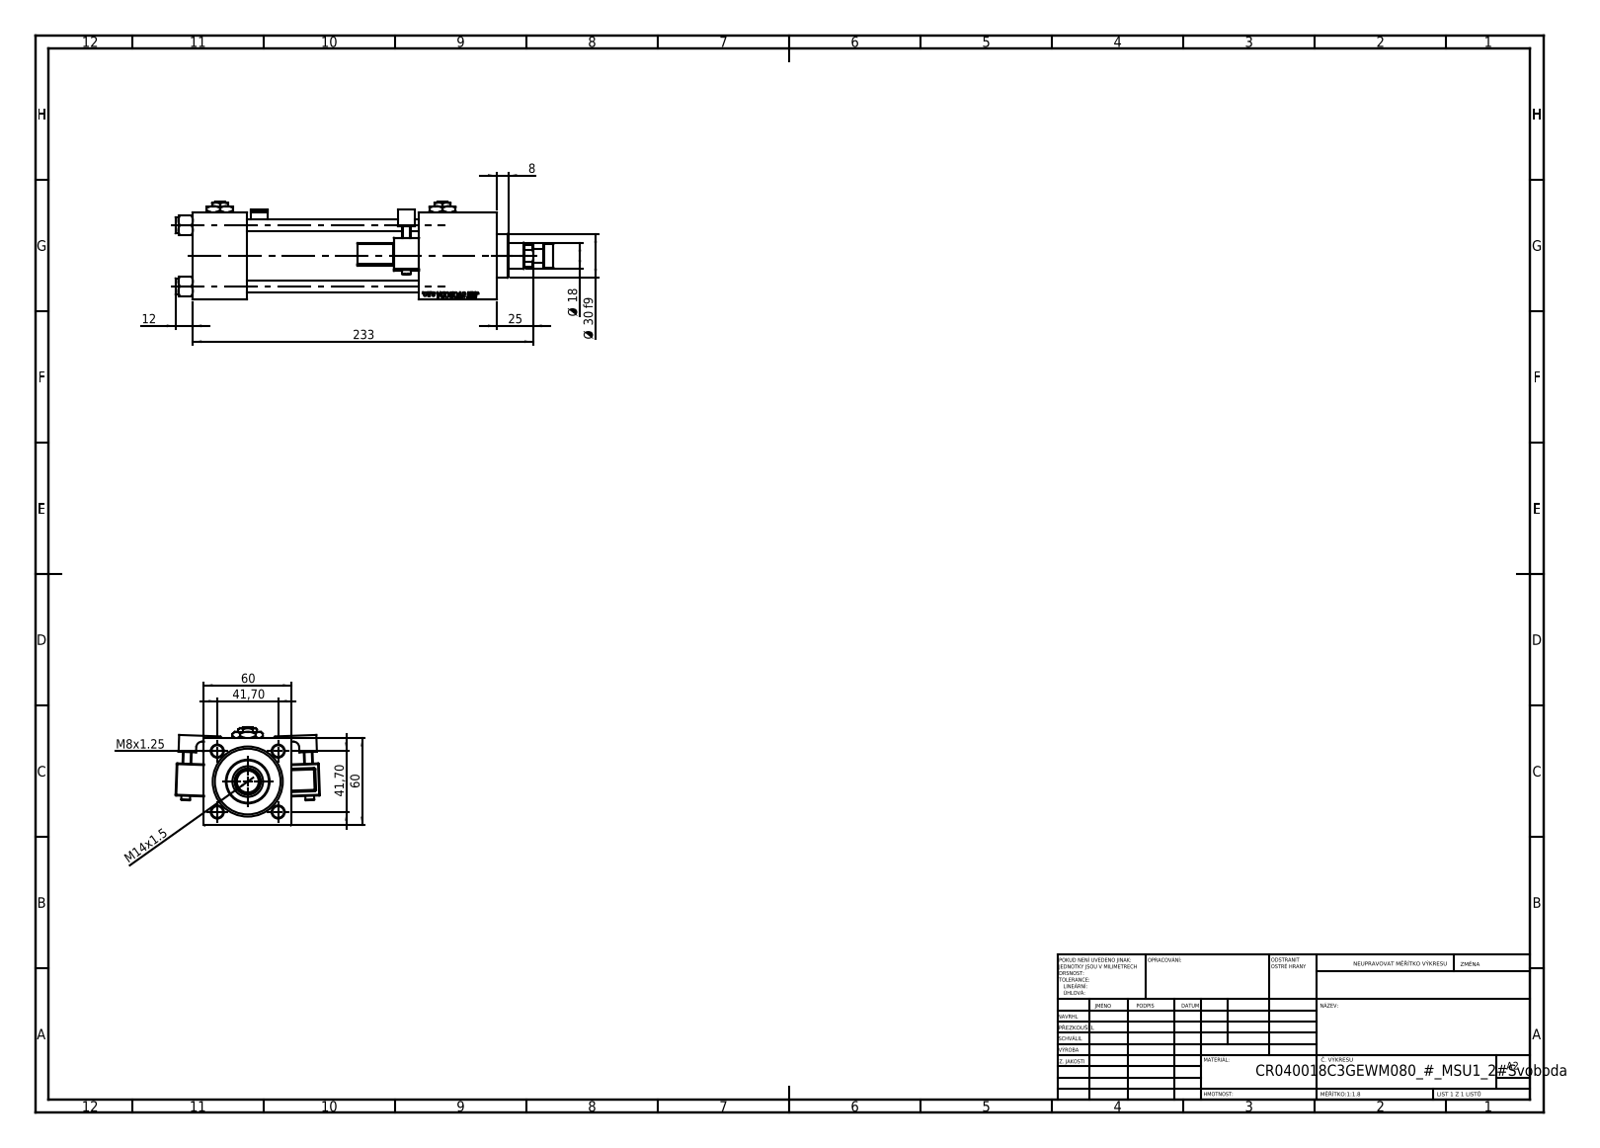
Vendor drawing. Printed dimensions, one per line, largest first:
233
60
60
41,70
41,70
Ø 30 f9
25
Ø 18
M14x1.5
12
8
M8x1.25
